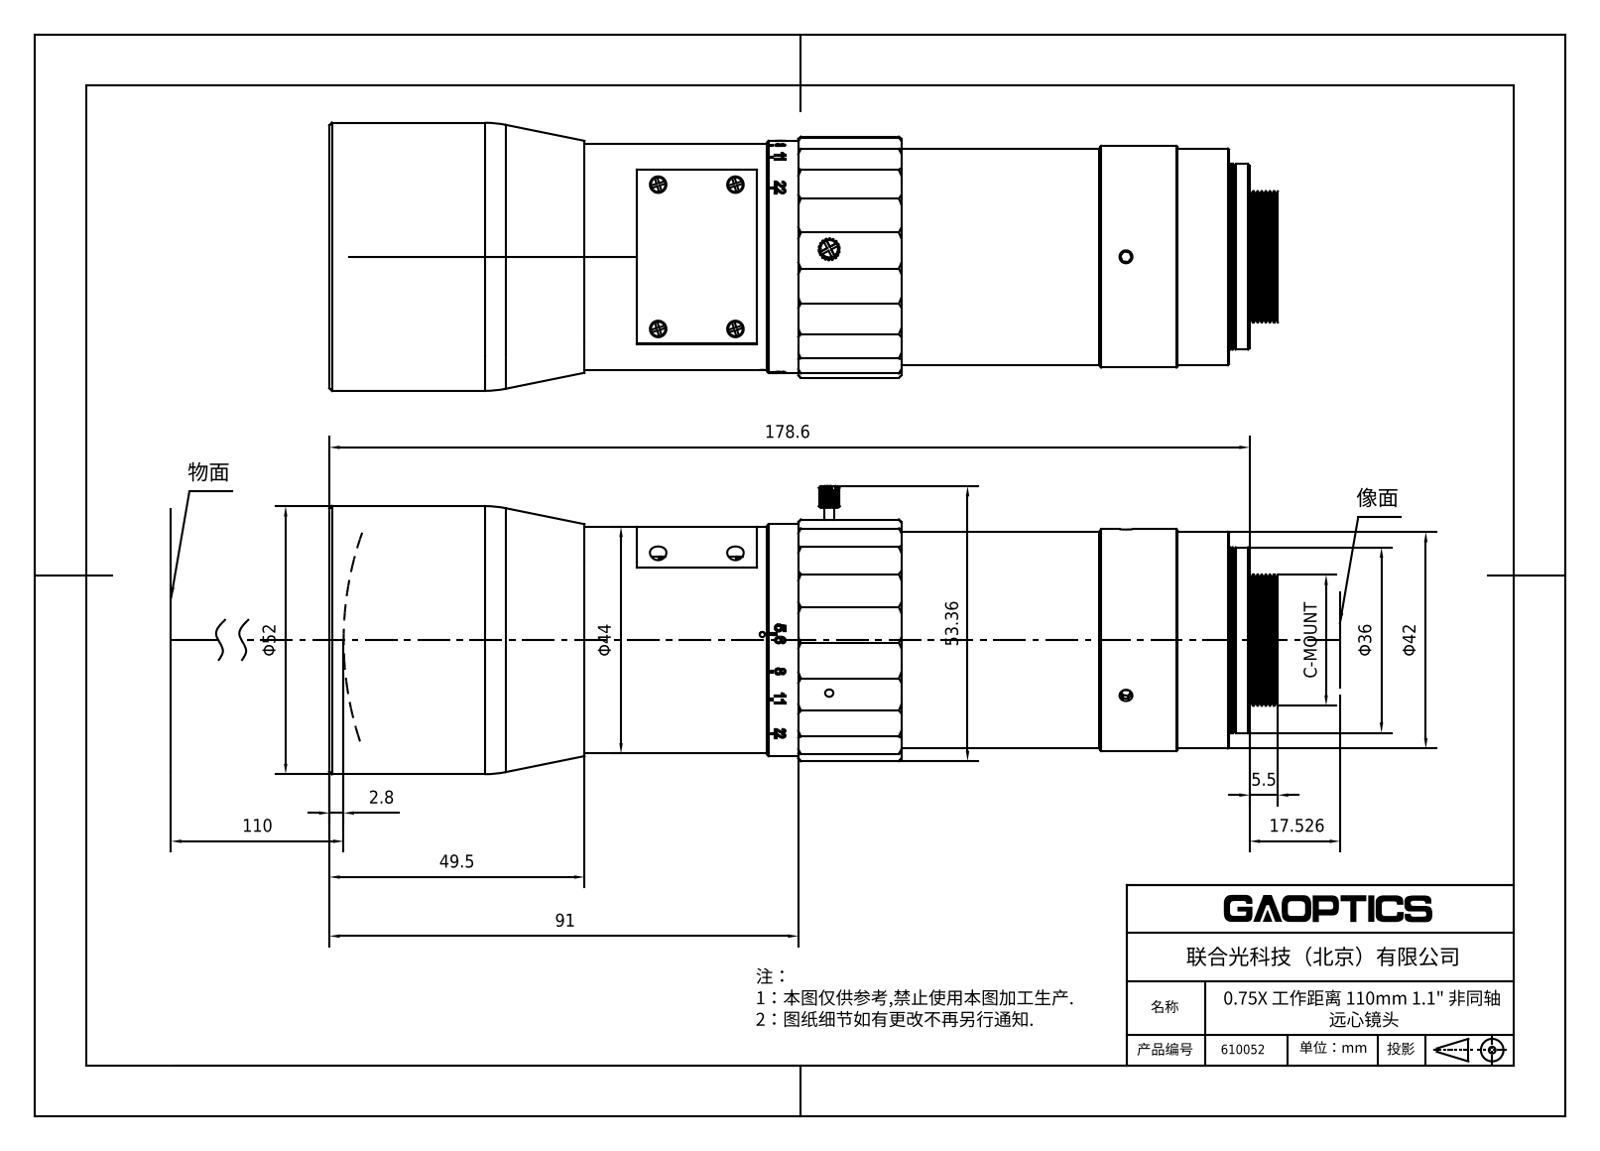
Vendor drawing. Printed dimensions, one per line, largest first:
178.6
110
91
53.36
Φ52
49.5
Φ44
Φ42
Φ36
17.526
5.5
2.8
C-MOUNT
